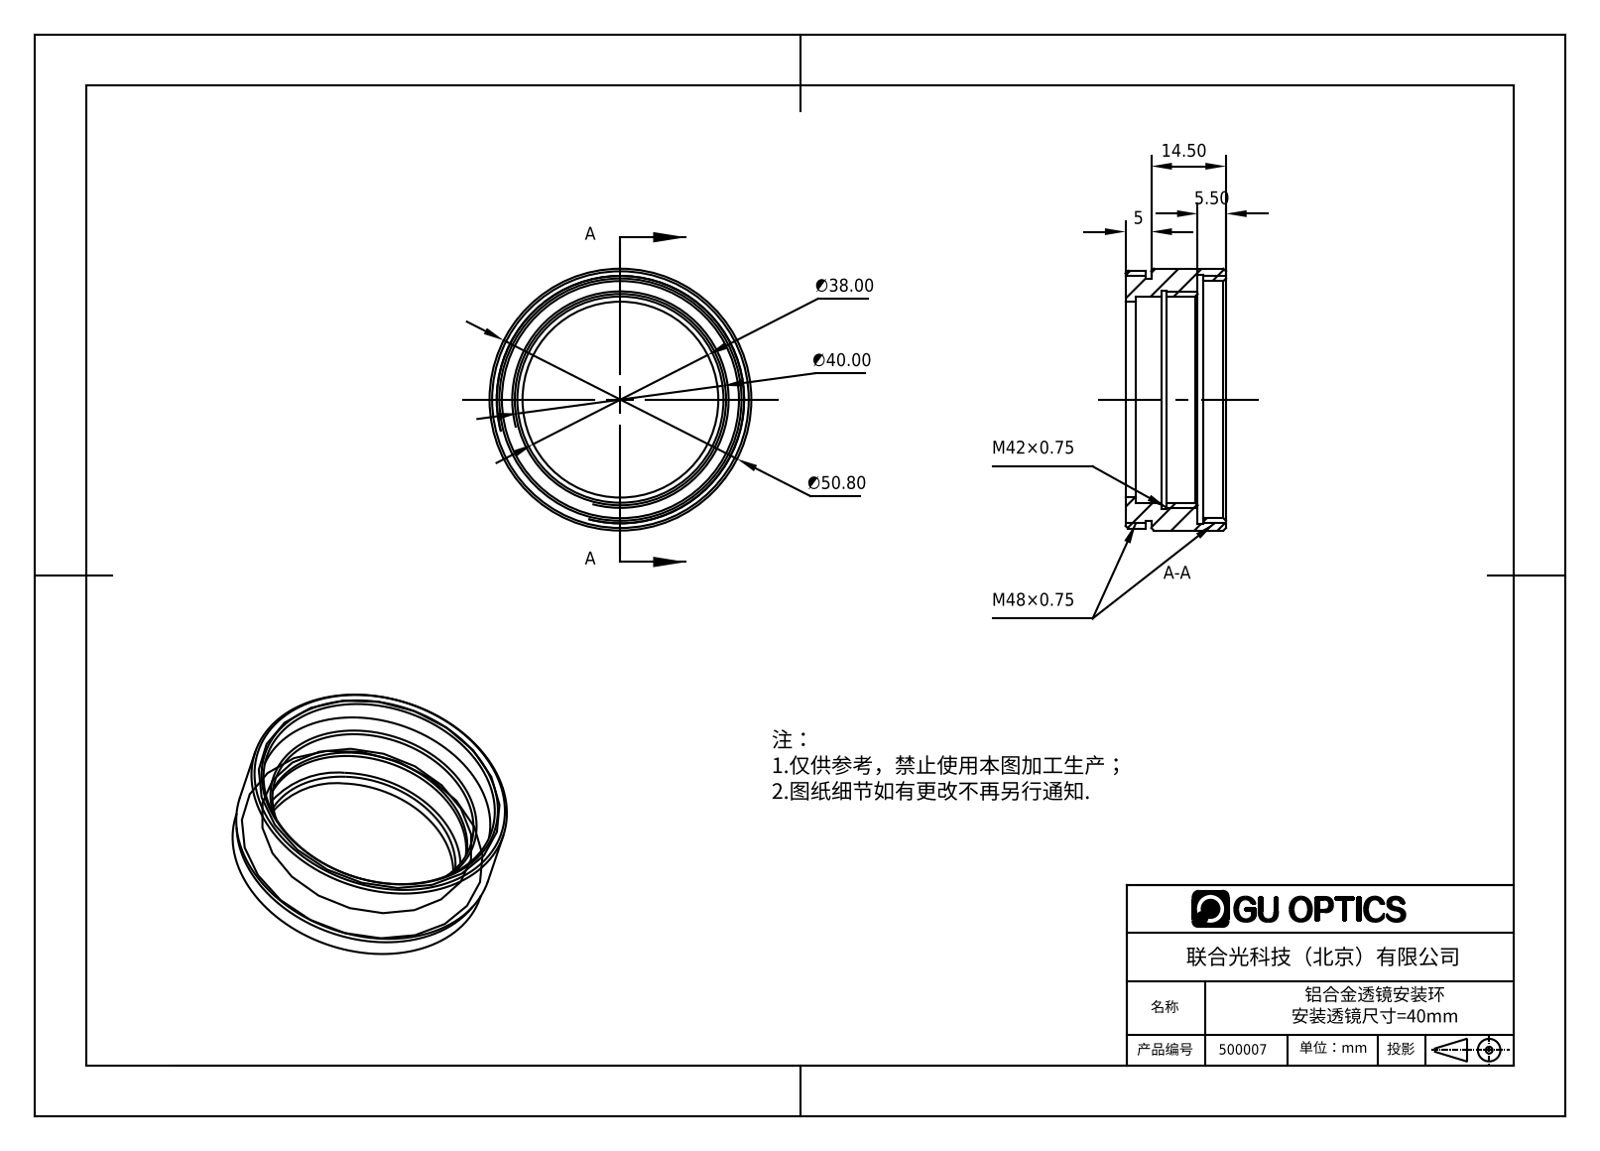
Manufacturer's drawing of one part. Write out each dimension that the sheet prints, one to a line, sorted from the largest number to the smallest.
∅50.80
∅40.00
∅38.00
14.50
5.50
5
